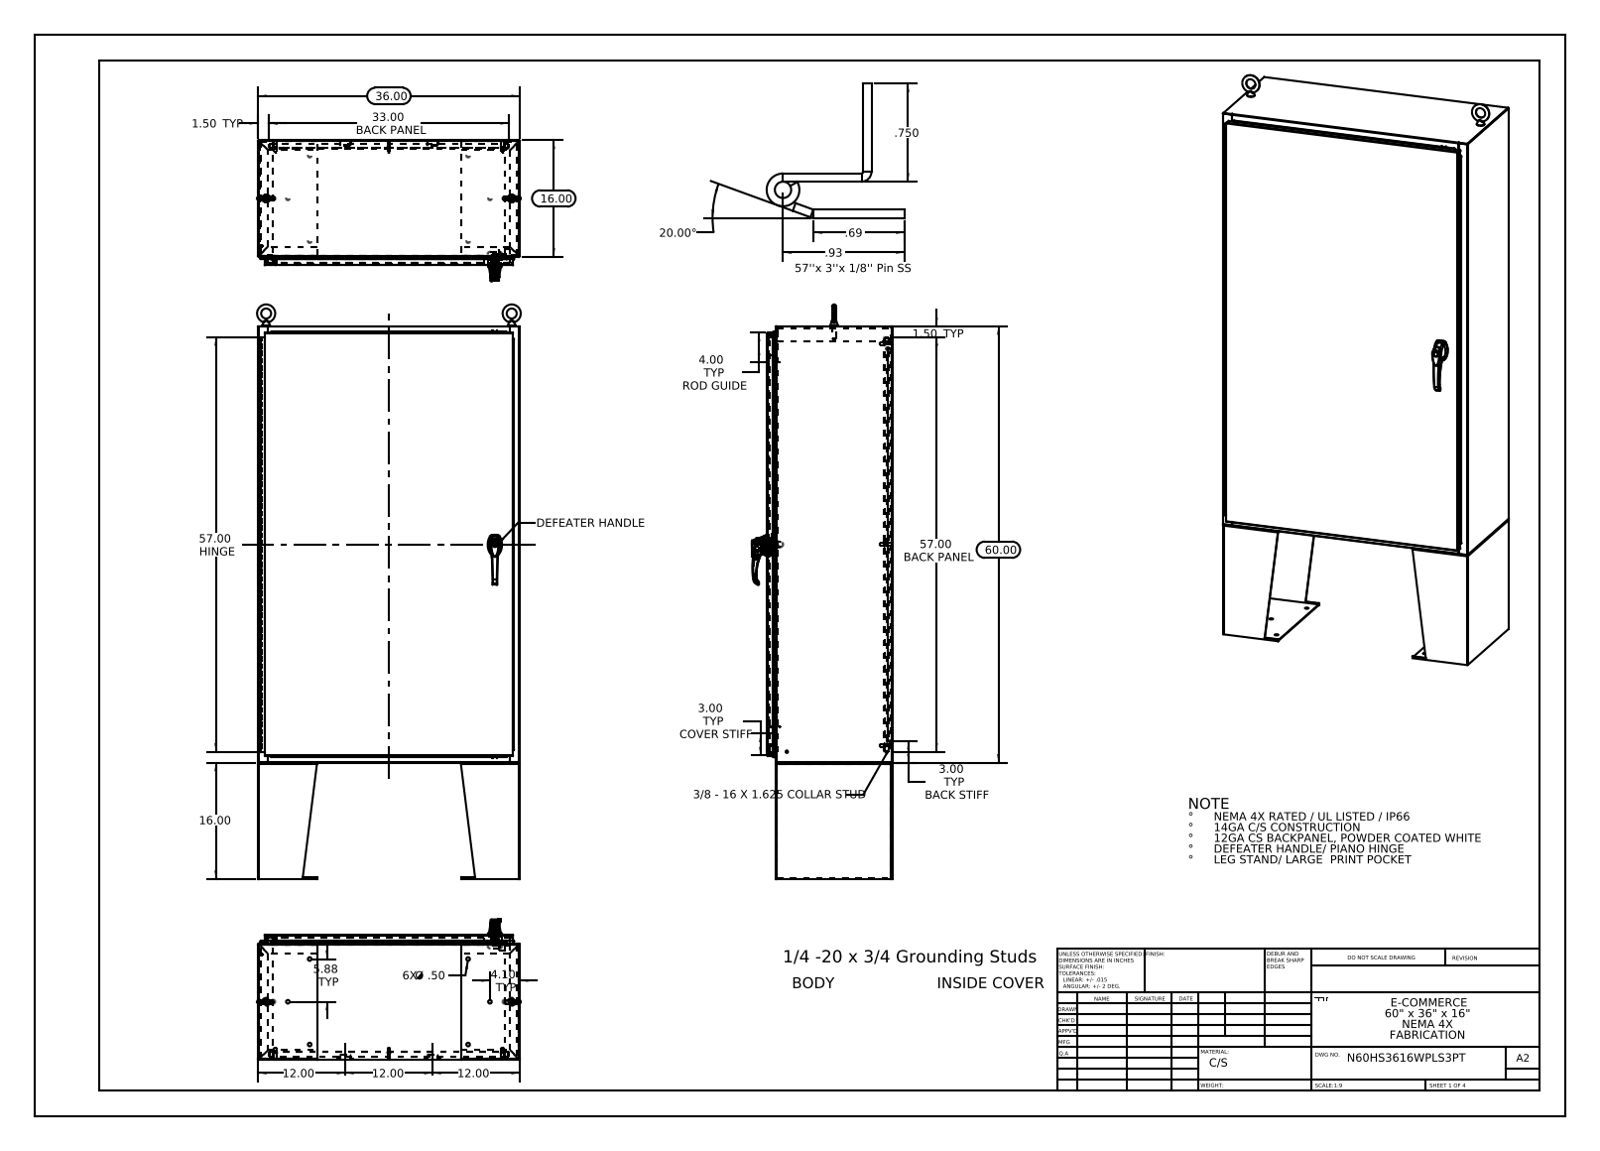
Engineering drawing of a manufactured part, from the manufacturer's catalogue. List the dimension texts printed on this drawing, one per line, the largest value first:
60.00
57.00 HINGE
57.00 BACK PANEL
36.00
33.00 BACK PANEL
20.00°
16.00
16.00
12.00
12.00
12.00
5.88 TYP
4.10 TYP
4.00 TYP ROD GUIDE
3.00 TYP COVER STIFF
3.00 TYP BACK STIFF
1.50 TYP
1.50 TYP
.93
.750
.69
6X Ø .50
